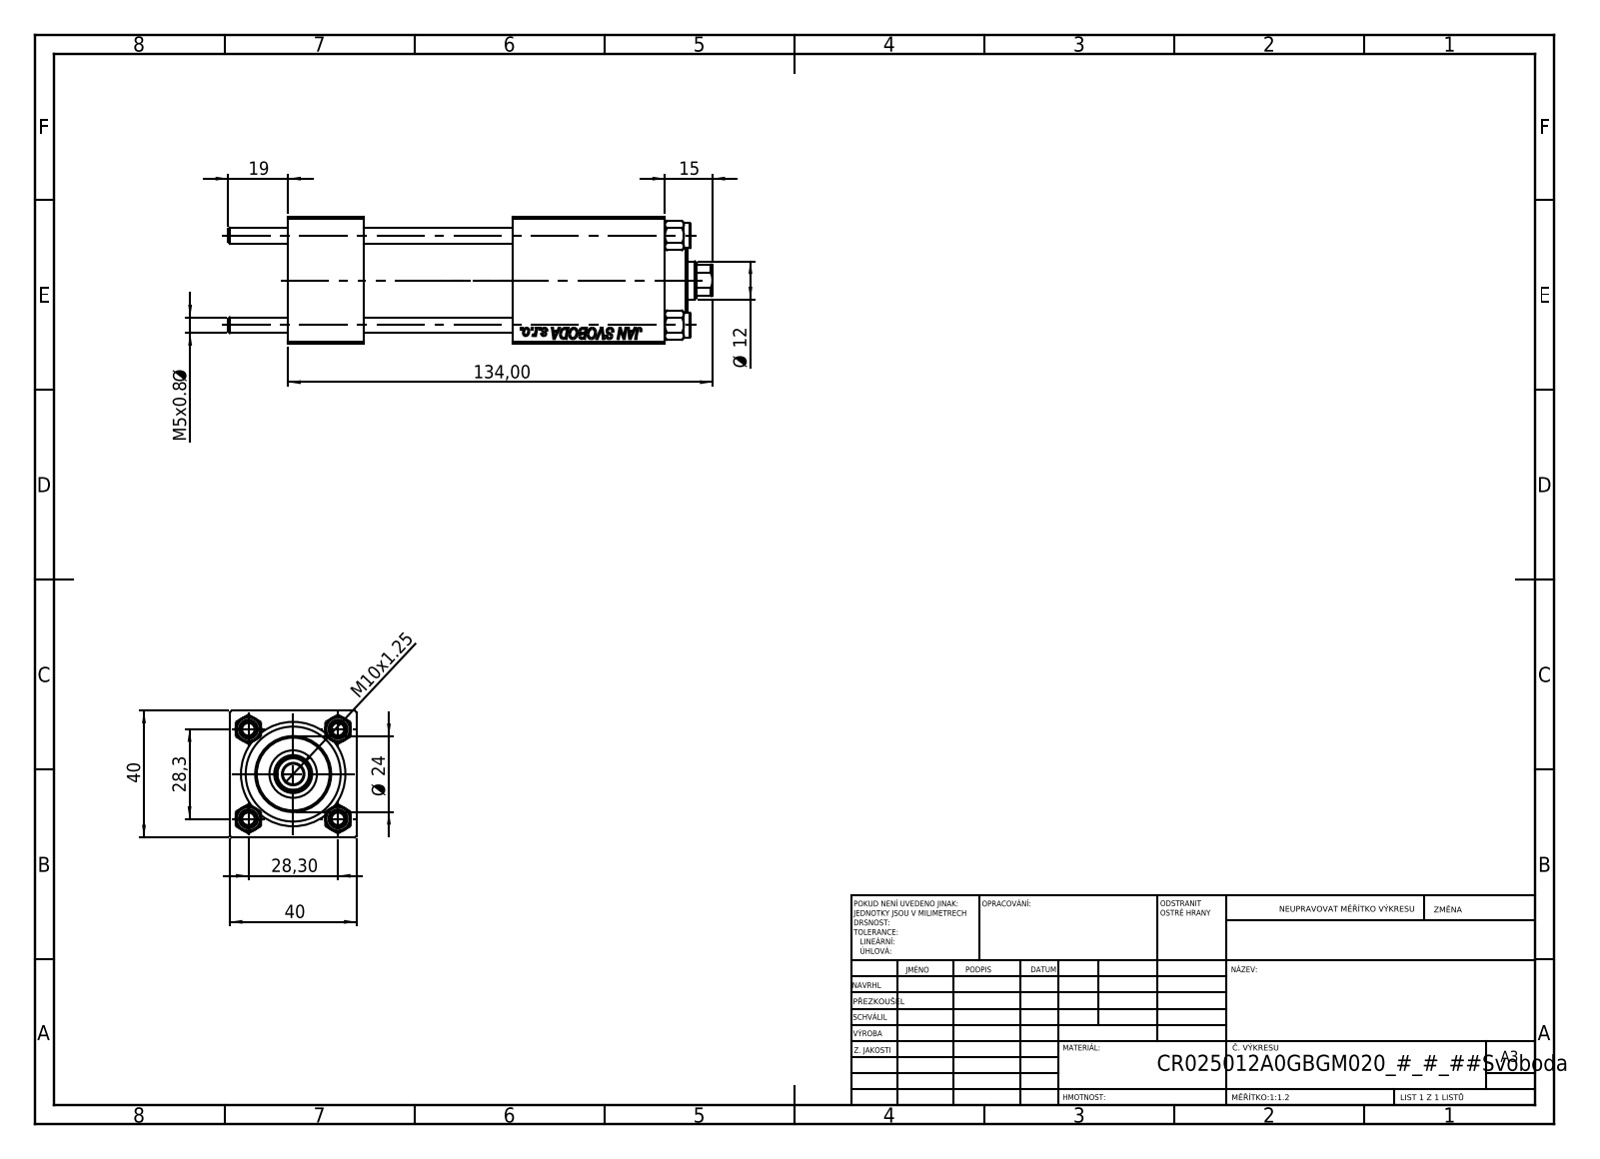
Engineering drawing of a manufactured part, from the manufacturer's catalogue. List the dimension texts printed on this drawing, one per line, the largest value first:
134,00
40
40
28,3
28,30
Ø 24
19
15
Ø 12
M10x1.25
M5x0.8 Ø
